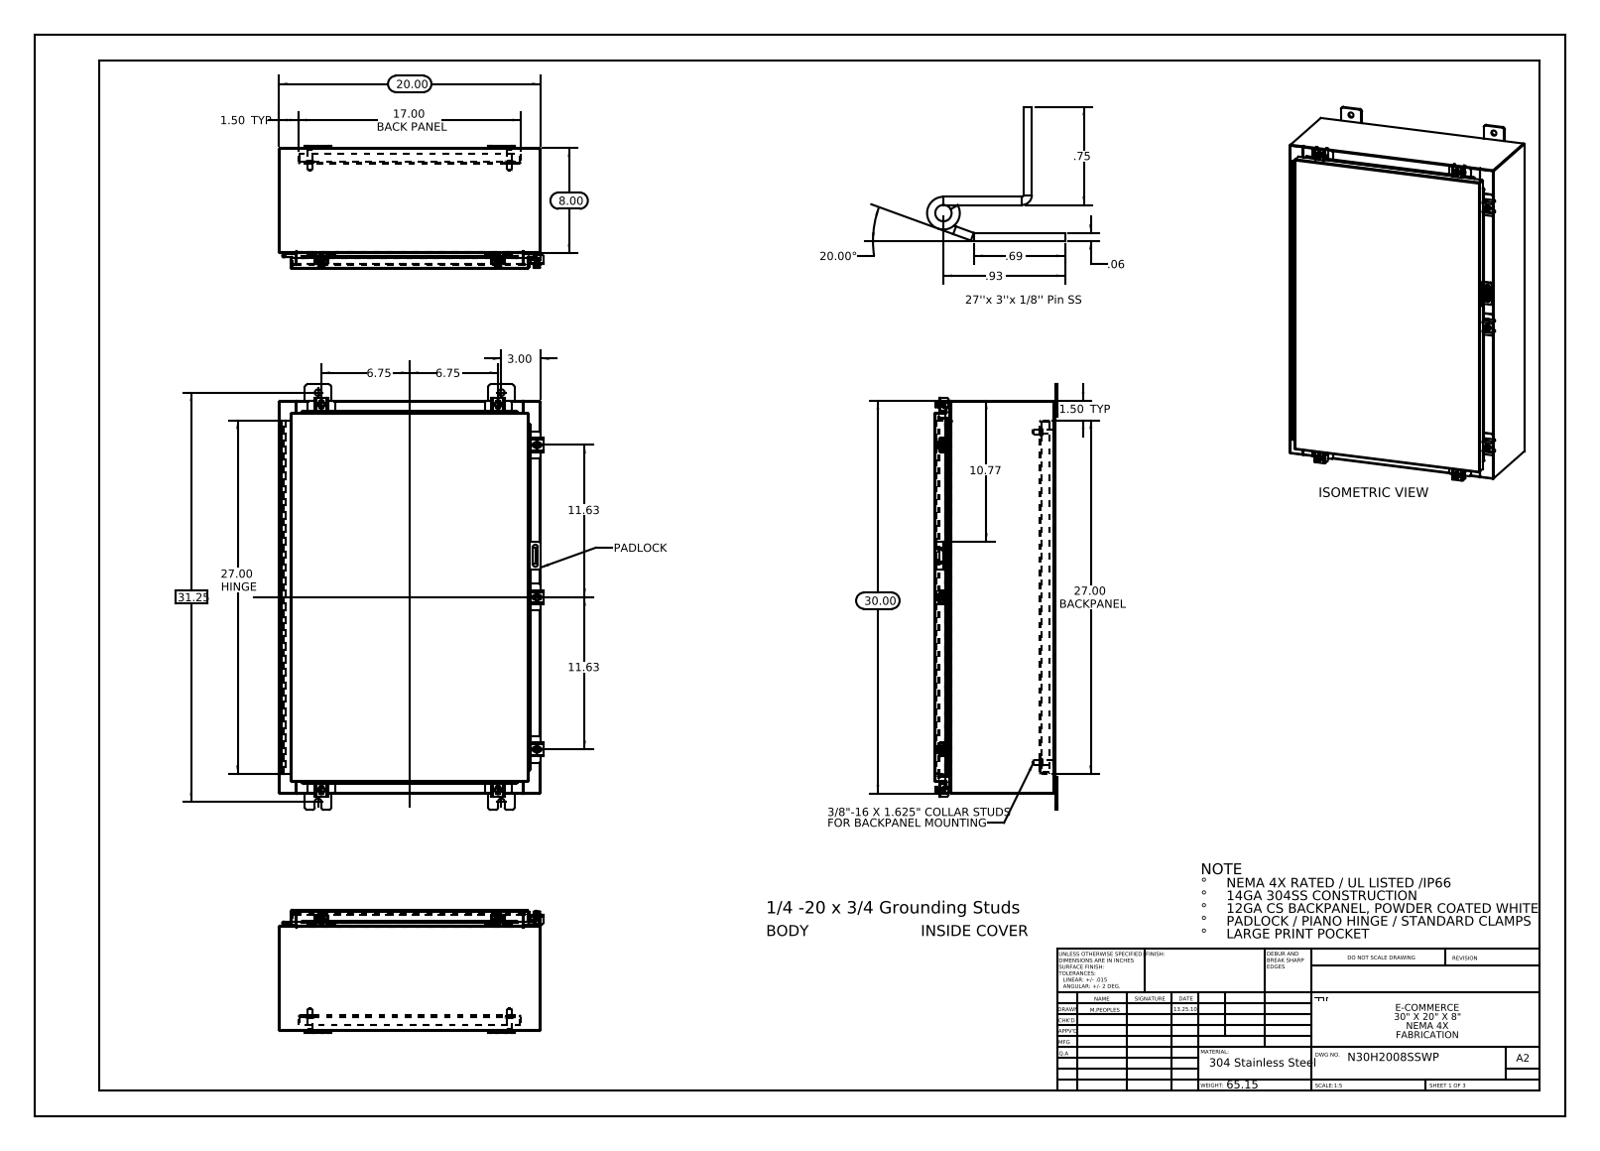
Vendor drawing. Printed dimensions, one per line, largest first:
31.25
30.00
27.00 HINGE
27.00 BACKPANEL
20.00
20.00°
17.00 BACK PANEL
11.63
11.63
10.77
8.00
6.75
6.75
3.00
1.50 TYP
1.50 TYP
.93
.75
.69
.06
